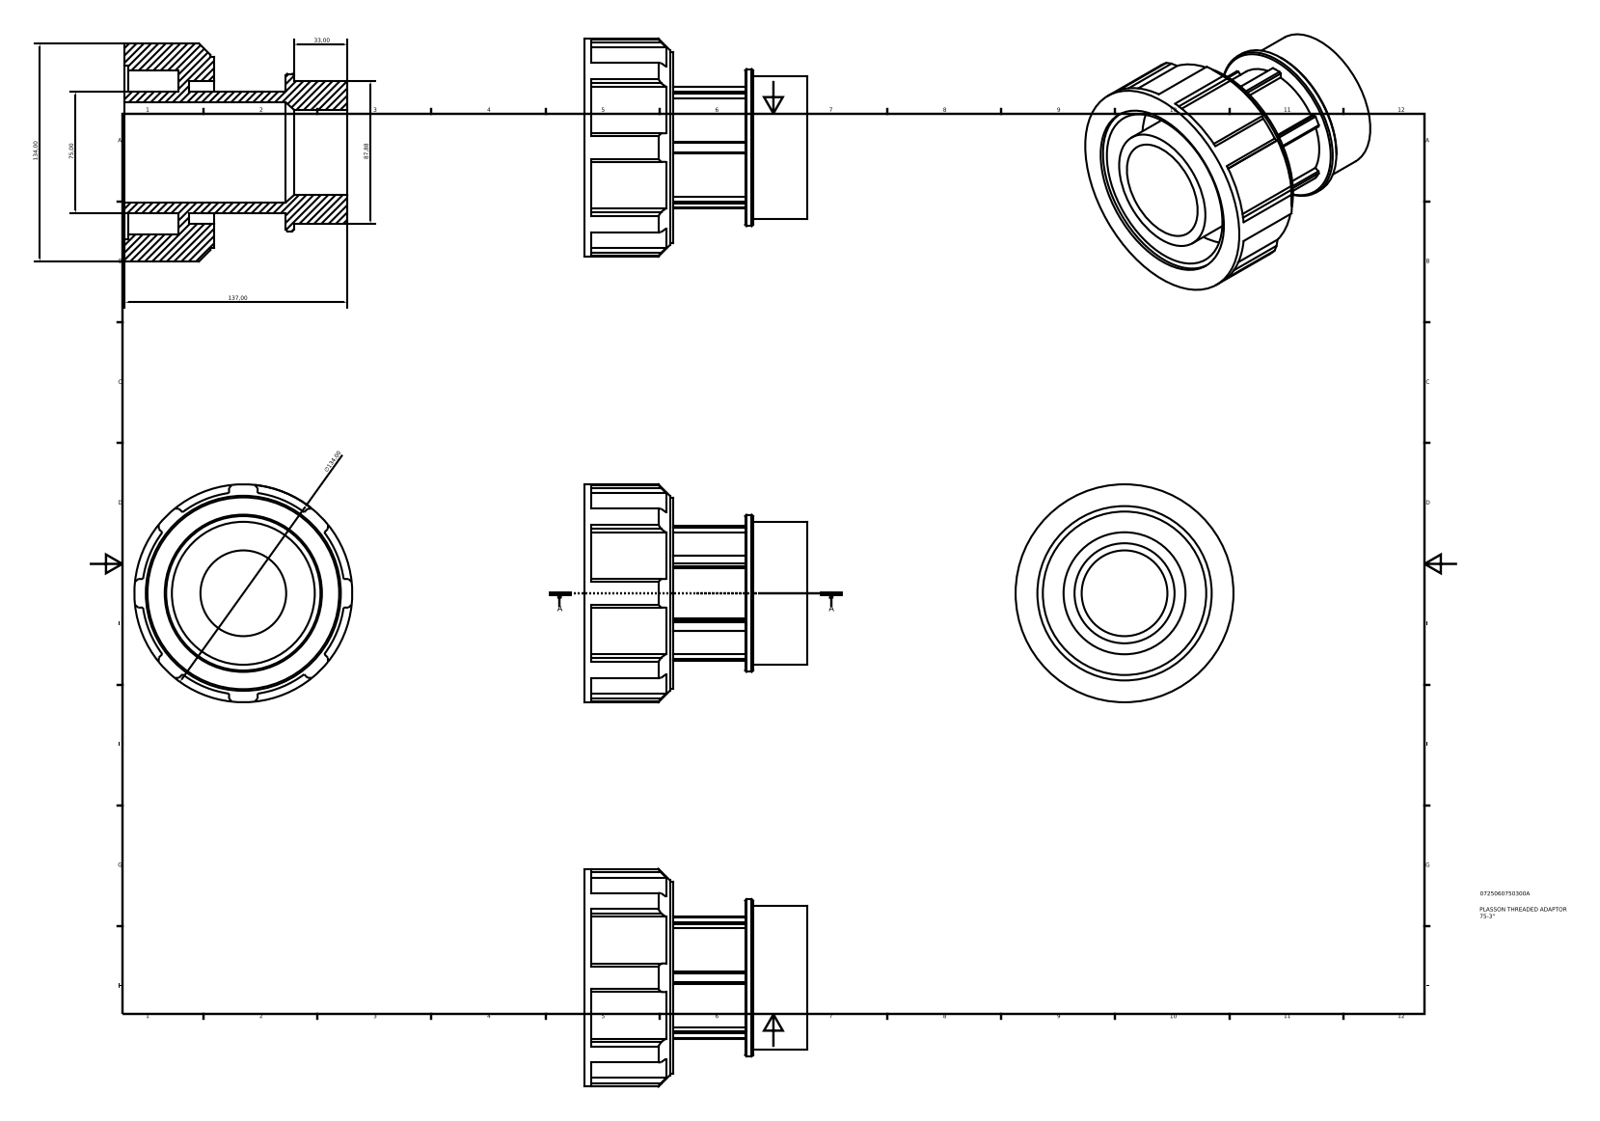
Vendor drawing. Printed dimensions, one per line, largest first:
137,00
134,00
∅134,00
87,88
75,00
33,00
